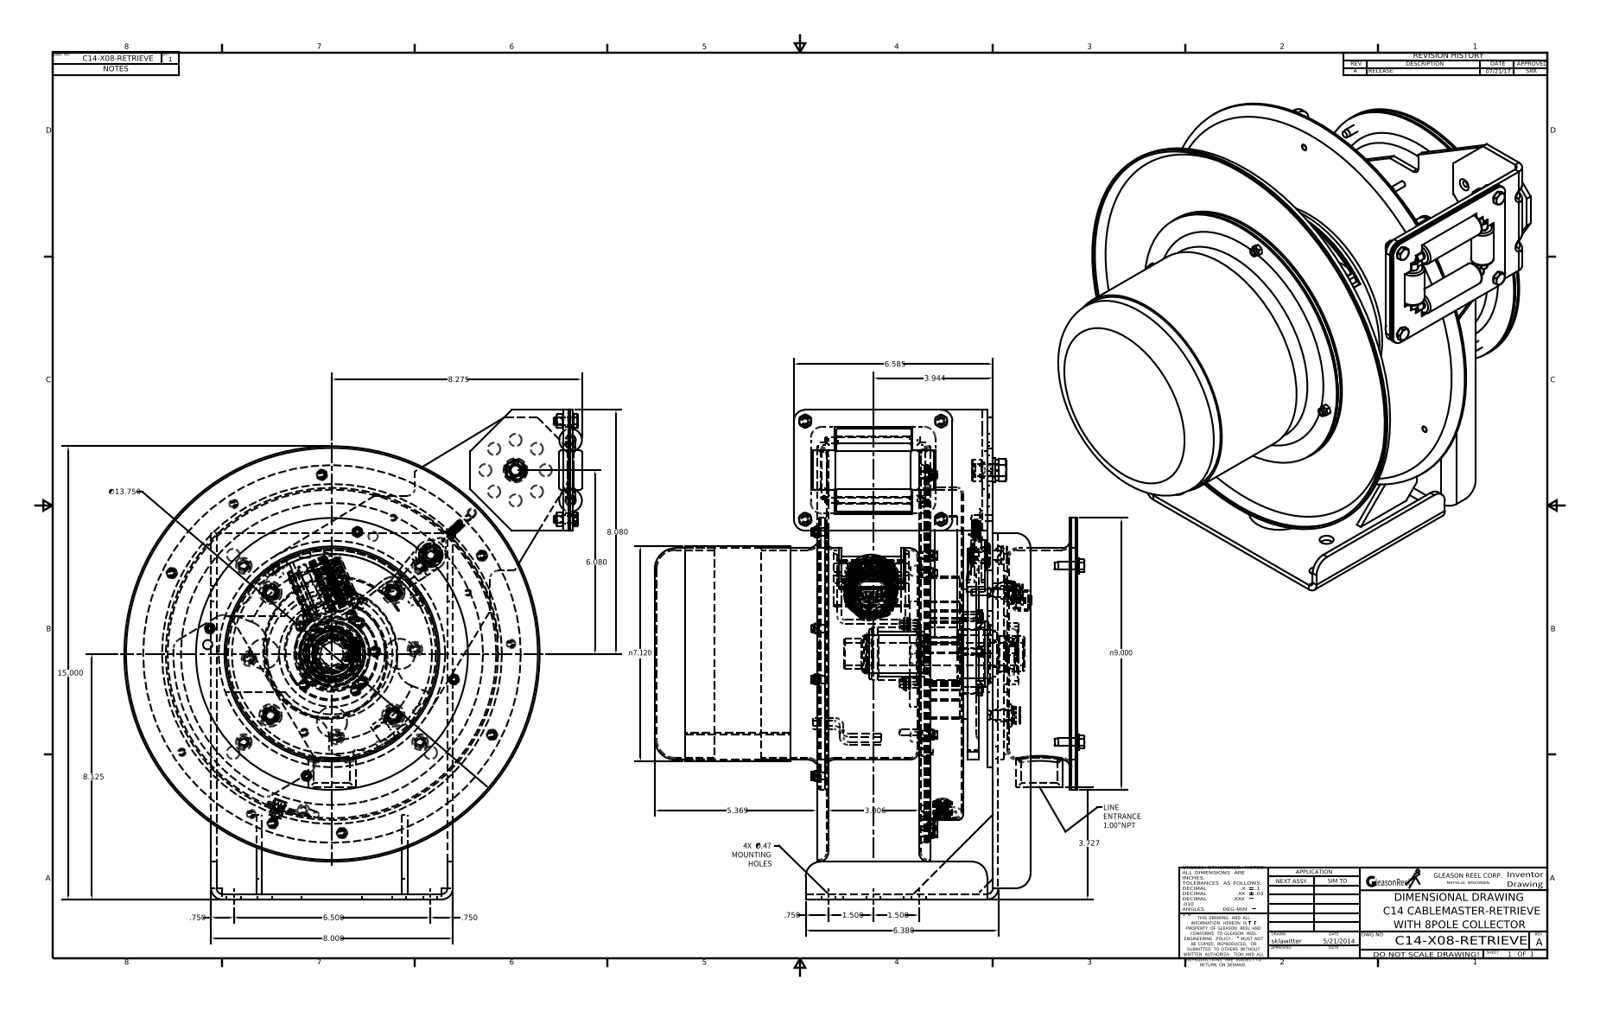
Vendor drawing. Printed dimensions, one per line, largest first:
15.000
∅13.750
n9.000
8.275
8.125
8.080
8.000
n7.120
6.585
6.500
6.380
6.080
5.369
3.944
3.727
3.006
1.500
1.500
.750
.750
.750
